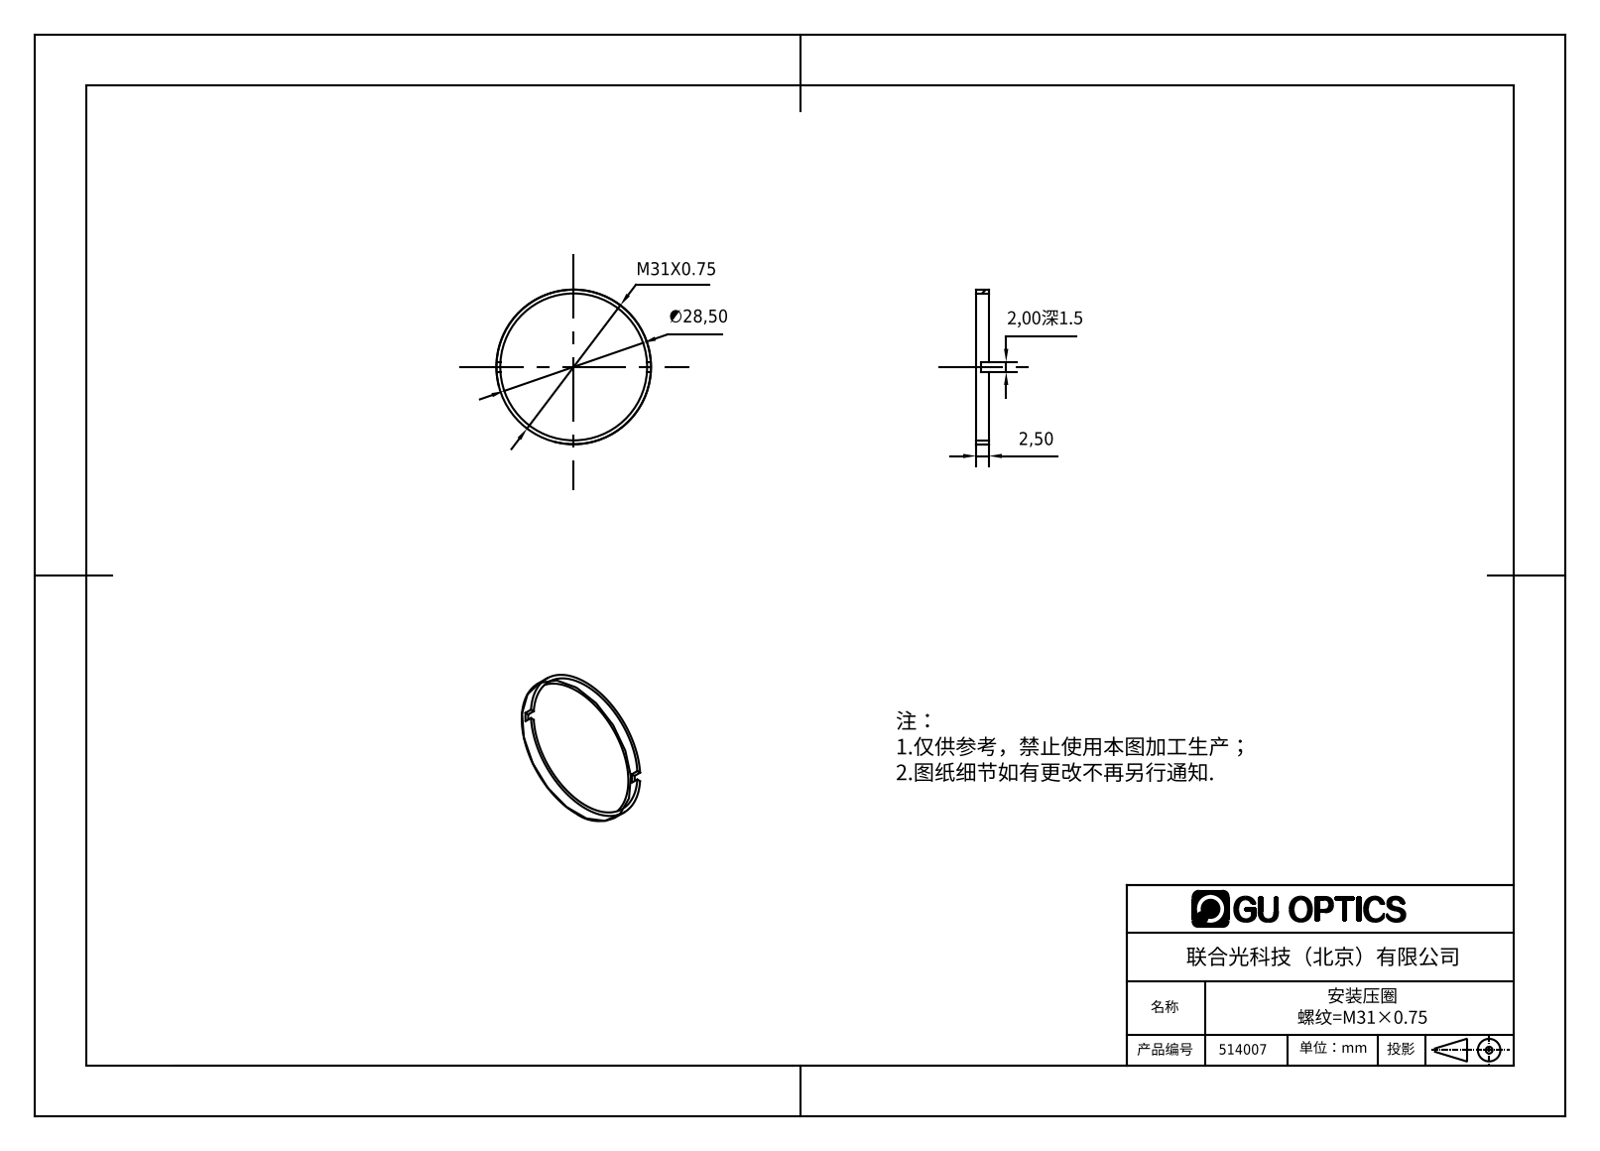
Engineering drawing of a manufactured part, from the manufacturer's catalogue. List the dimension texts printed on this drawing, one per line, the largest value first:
M31X0.75
∅28,50
2,50
2,00深1.5
